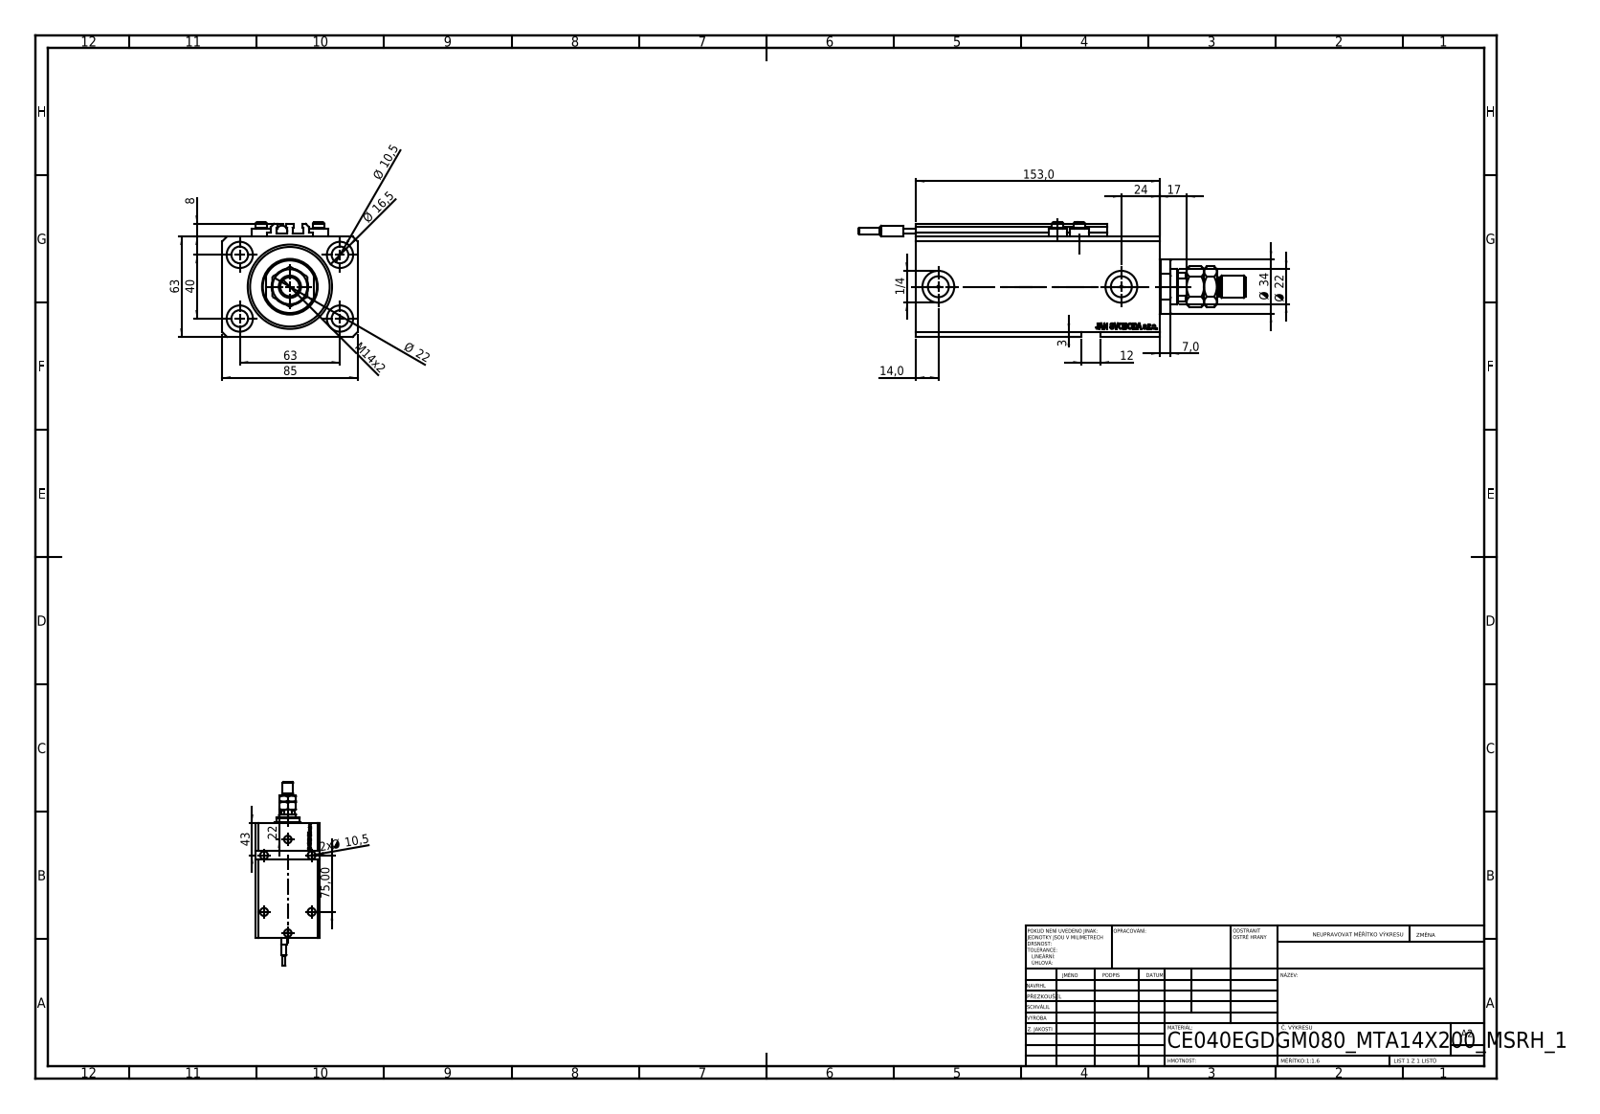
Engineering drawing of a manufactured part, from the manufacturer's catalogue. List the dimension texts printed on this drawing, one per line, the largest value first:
153,0
85
75,00
63
63
43
40
Ø 34
24
Ø 22
Ø 22
22
17
Ø 16,5
M14x2
14,0
12
Ø 10,5
2x Ø 10,5
8
7,0
3
1/4
